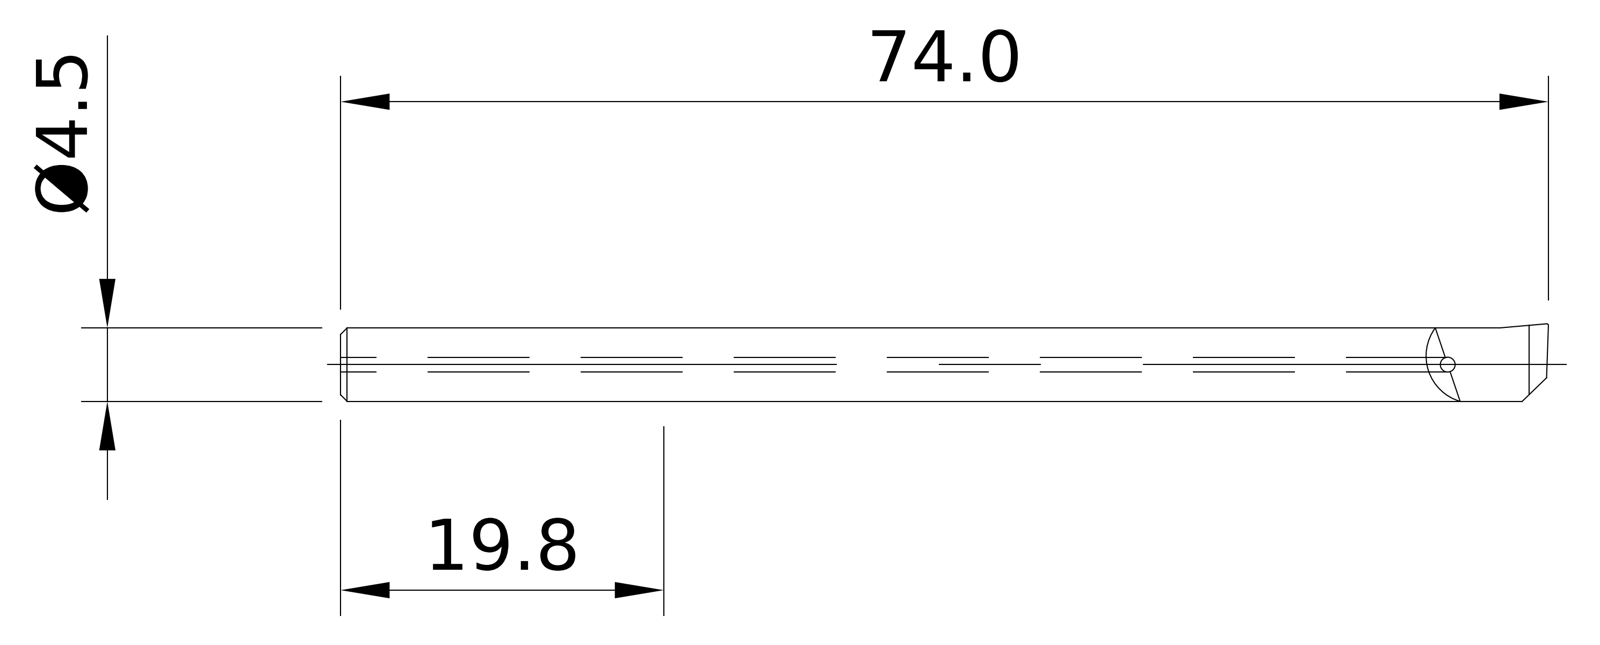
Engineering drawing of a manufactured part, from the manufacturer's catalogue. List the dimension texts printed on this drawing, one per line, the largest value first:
74.0
19.8
Ø4.5
